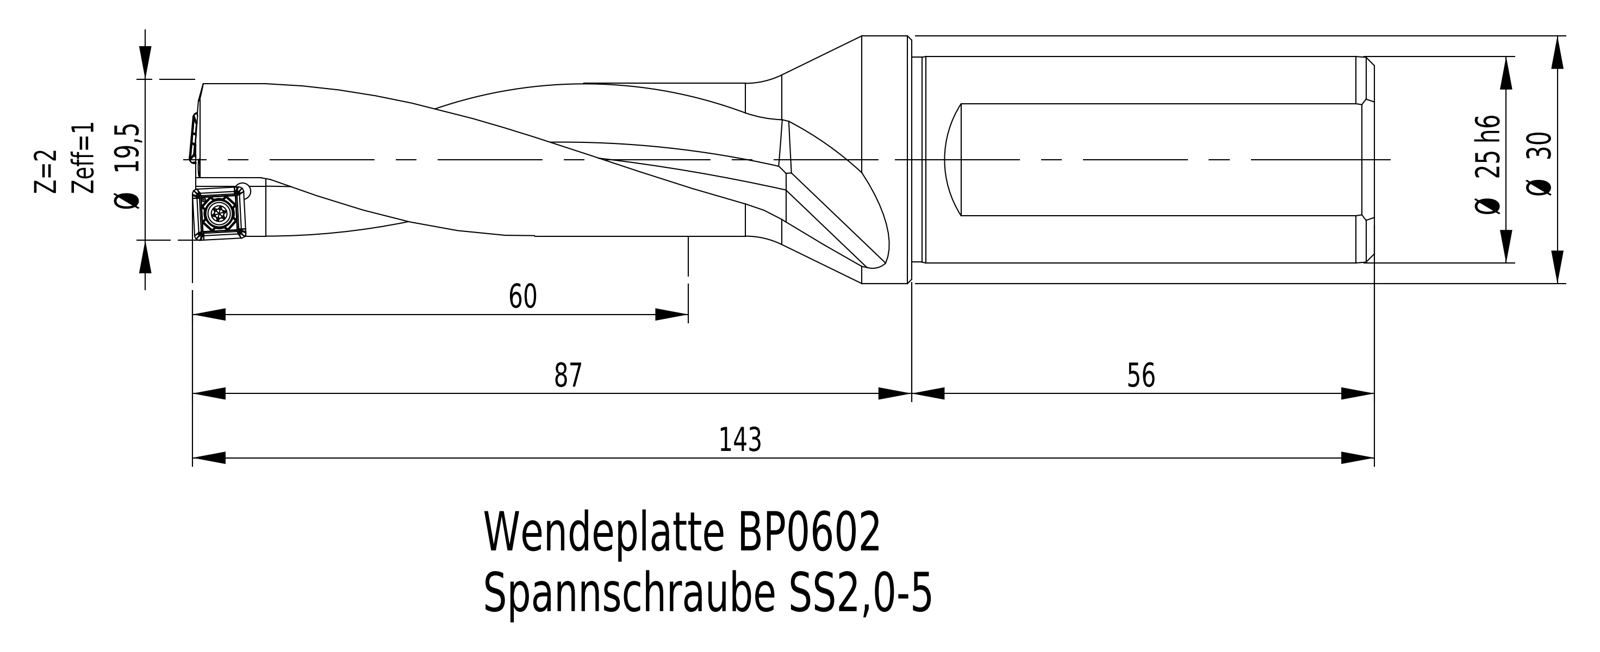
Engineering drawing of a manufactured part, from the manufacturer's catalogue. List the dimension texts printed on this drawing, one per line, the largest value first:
143
87
60
56
Ø 30
Ø 25 h6
Ø 19,5
